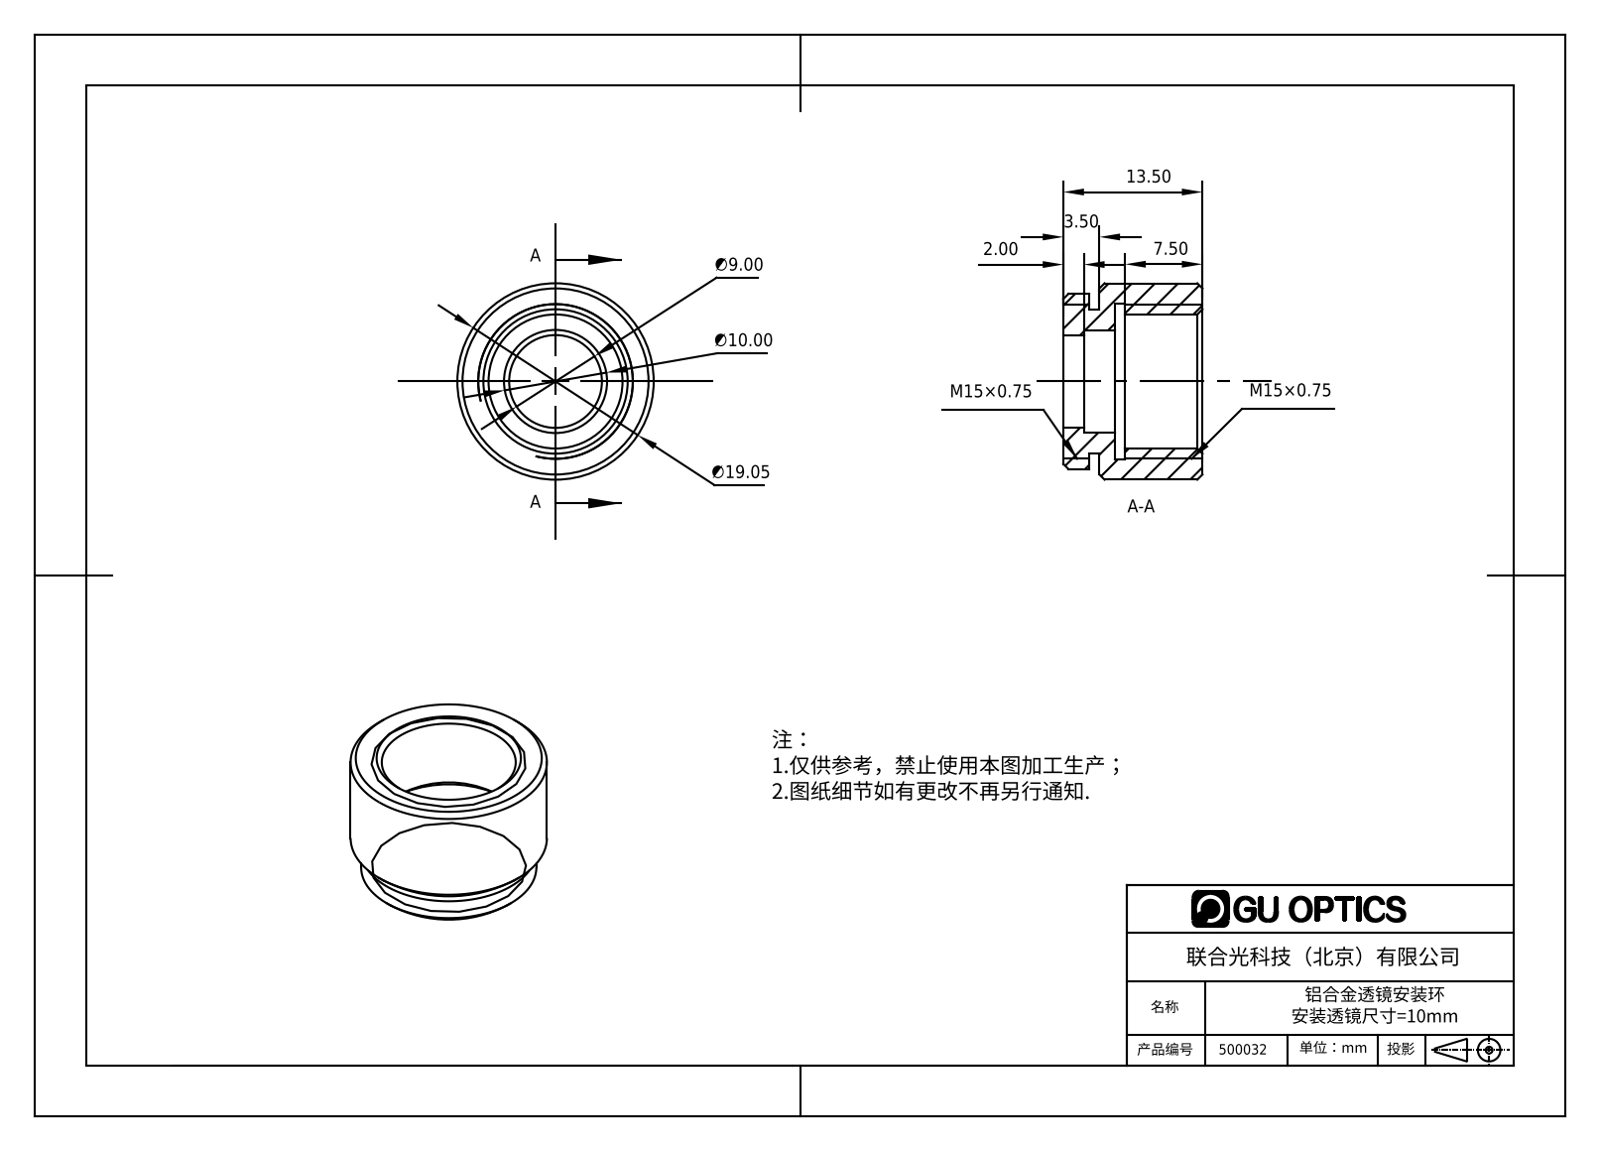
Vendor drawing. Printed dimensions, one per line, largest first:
∅19.05
13.50
∅10.00
∅9.00
7.50
3.50
2.00
